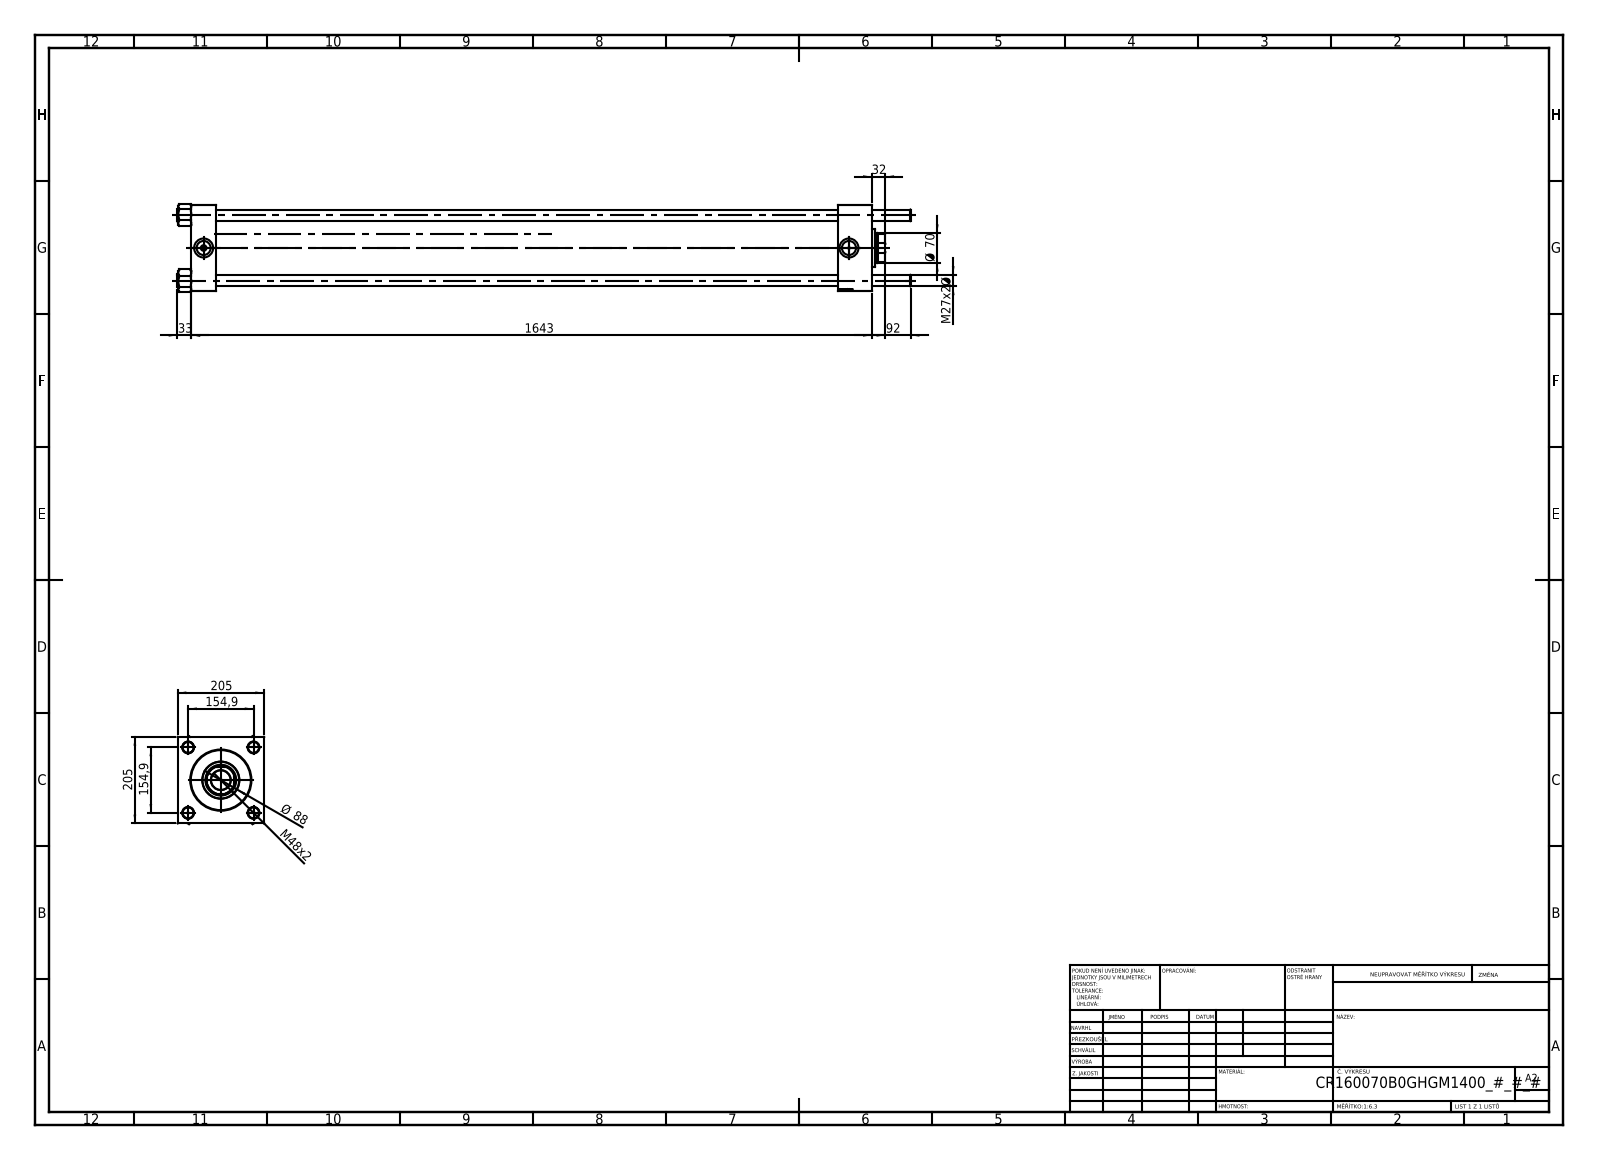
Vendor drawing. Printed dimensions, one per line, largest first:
1643
205
205
154,9
154,9
92
Ø 88
Ø 70
M48x2
33
32
M27x2 Ø
